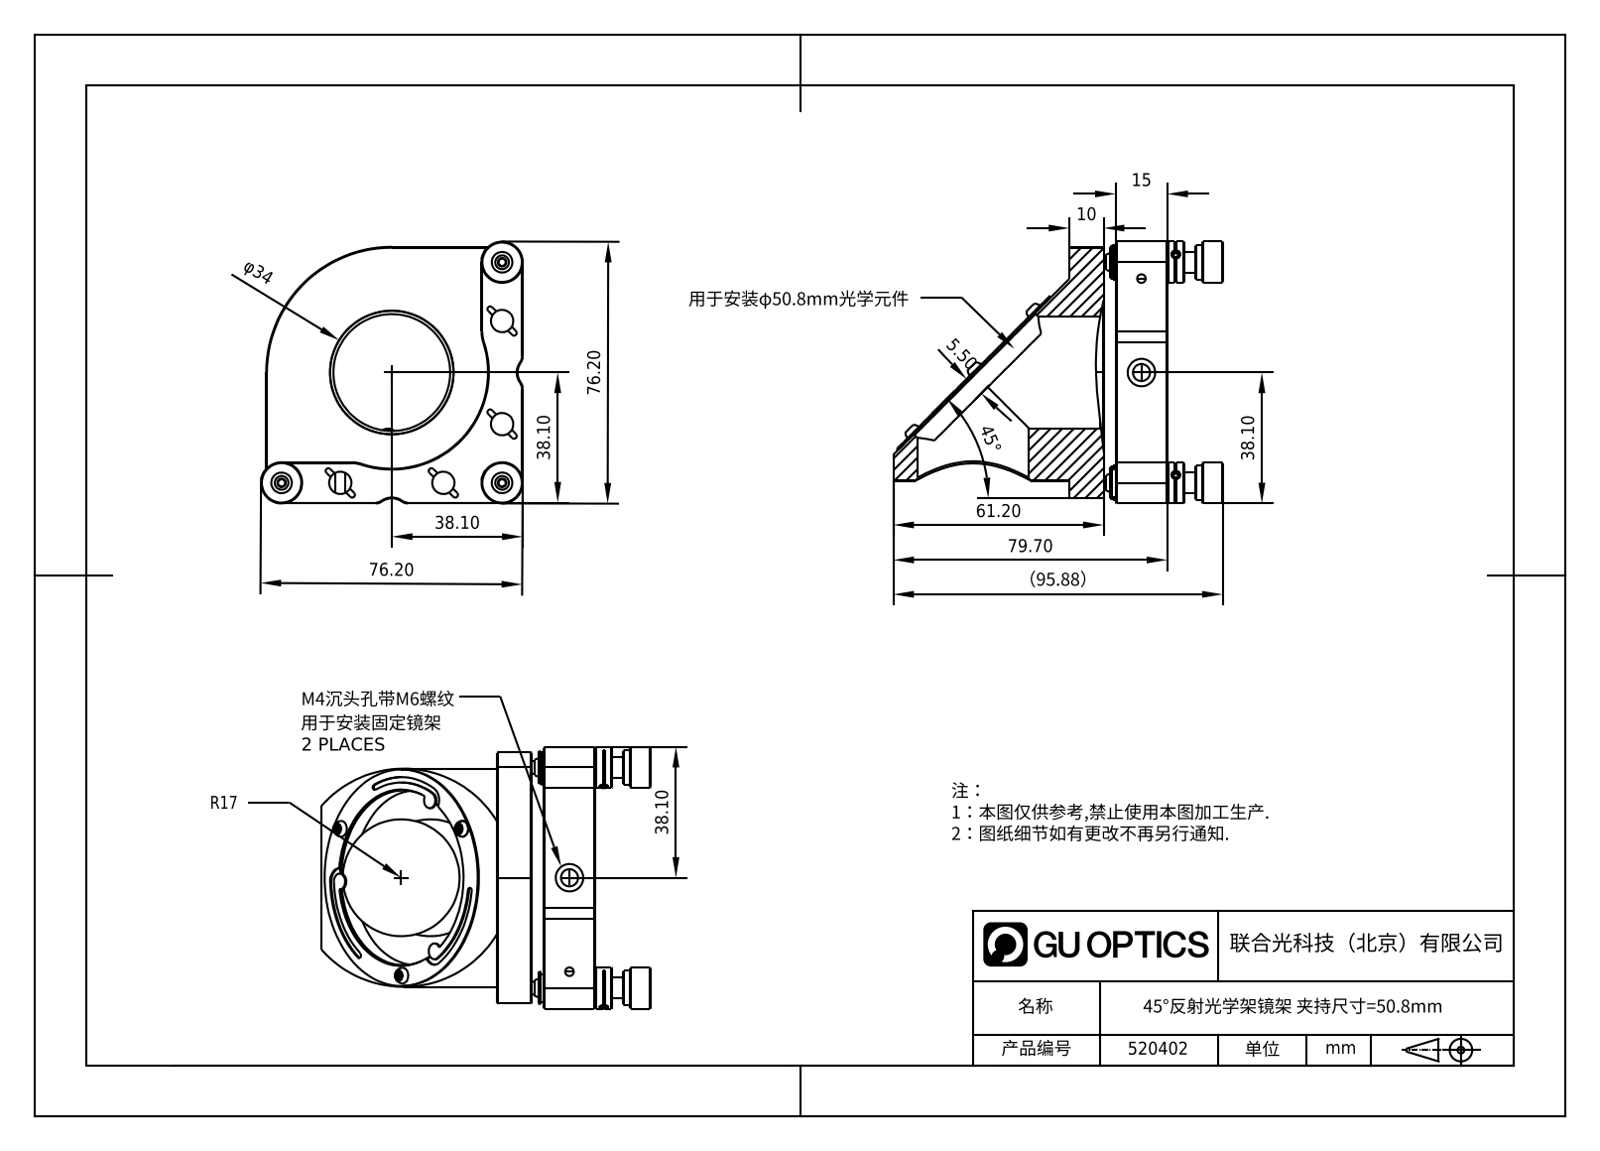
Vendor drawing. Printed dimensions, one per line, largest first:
（95.88）
79.70
76.20
76.20
61.20
45°
38.10
38.10
38.10
38.10
φ34
15
10
5.50
